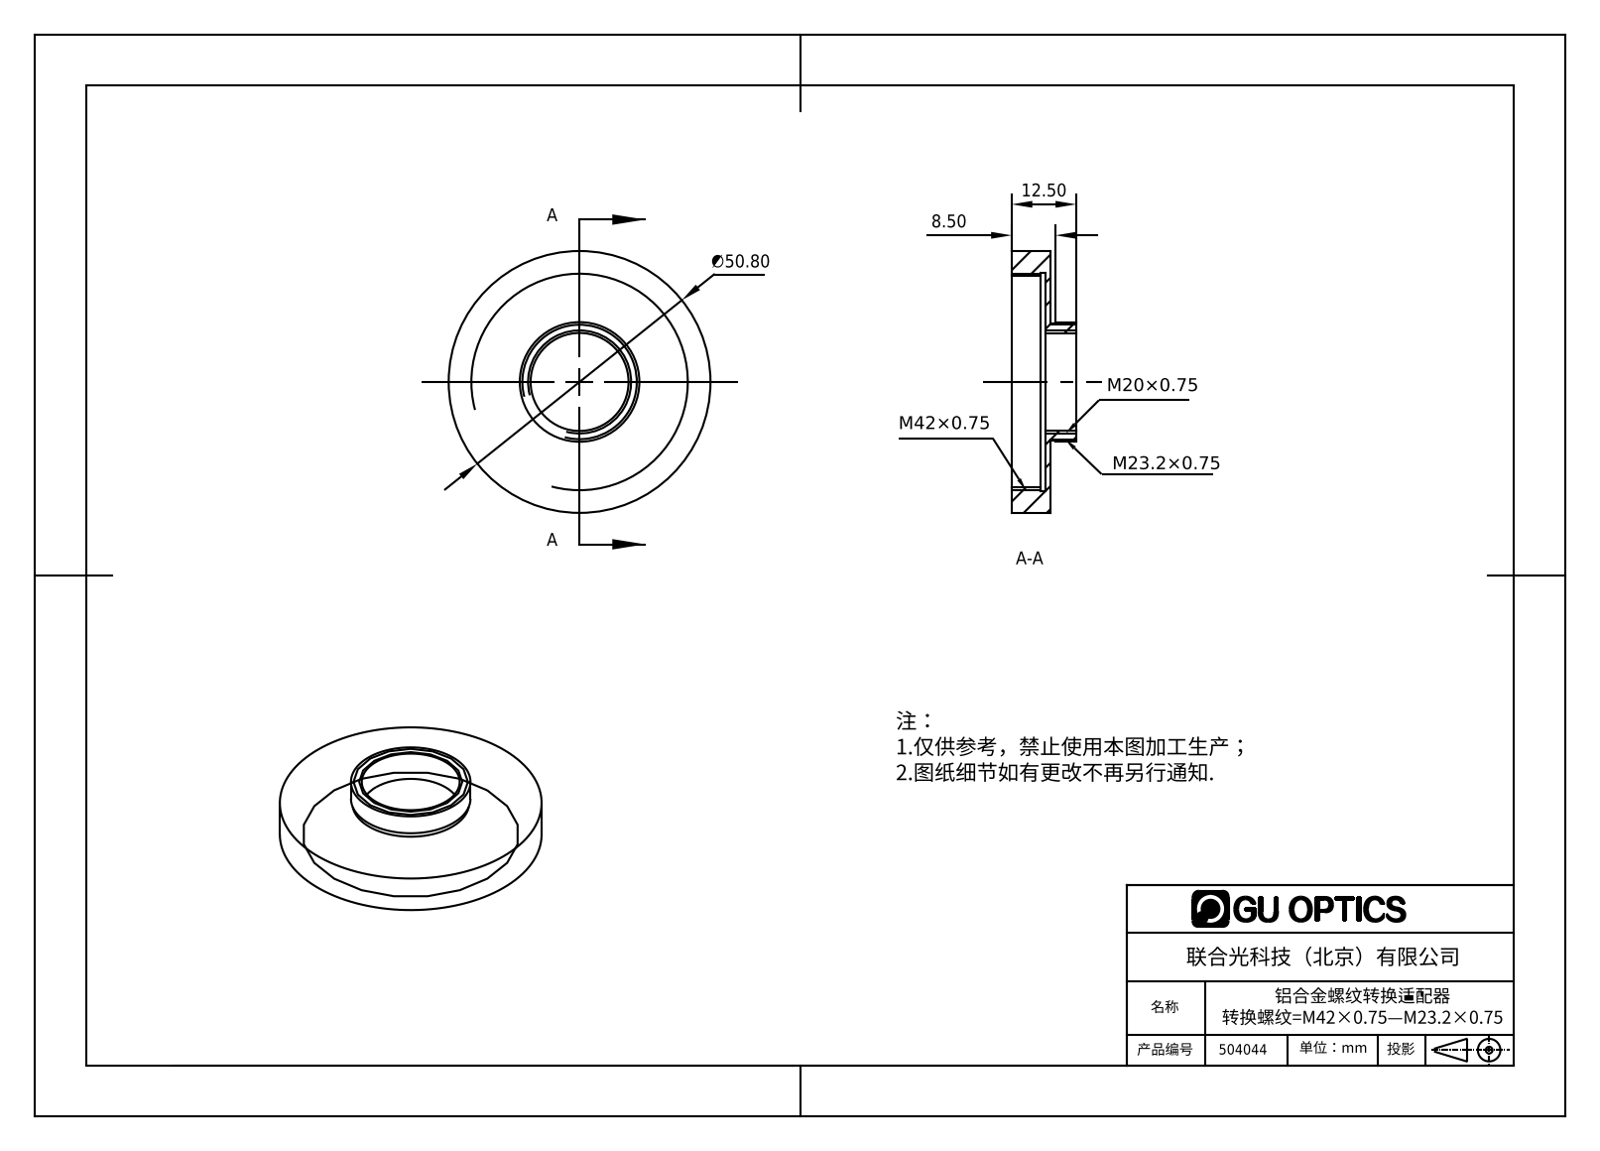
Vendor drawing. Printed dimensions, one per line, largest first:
∅50.80
12.50
8.50
